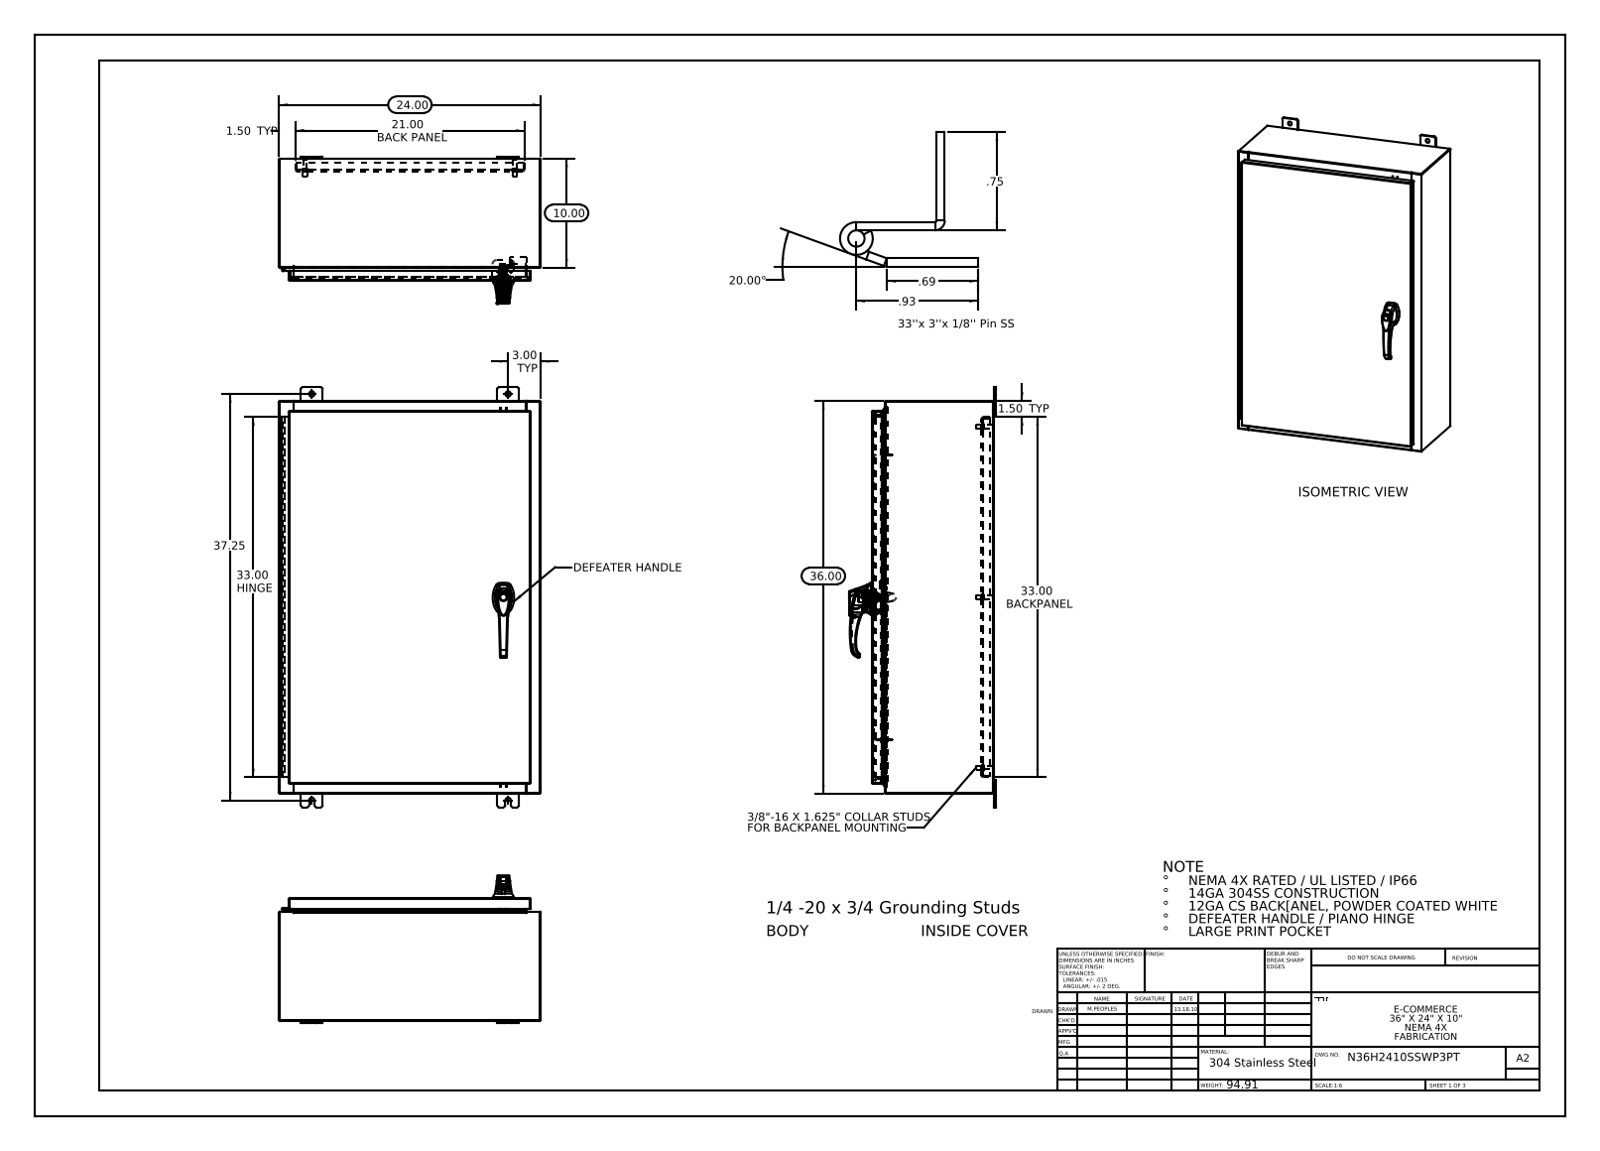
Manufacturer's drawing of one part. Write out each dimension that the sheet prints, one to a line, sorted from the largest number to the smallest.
37.25
36.00
33.00 HINGE
33.00 BACKPANEL
24.00
21.00 BACK PANEL
20.00°
10.00
3.00 TYP
1.50 TYP
1.50 TYP
.93
.75
.69
